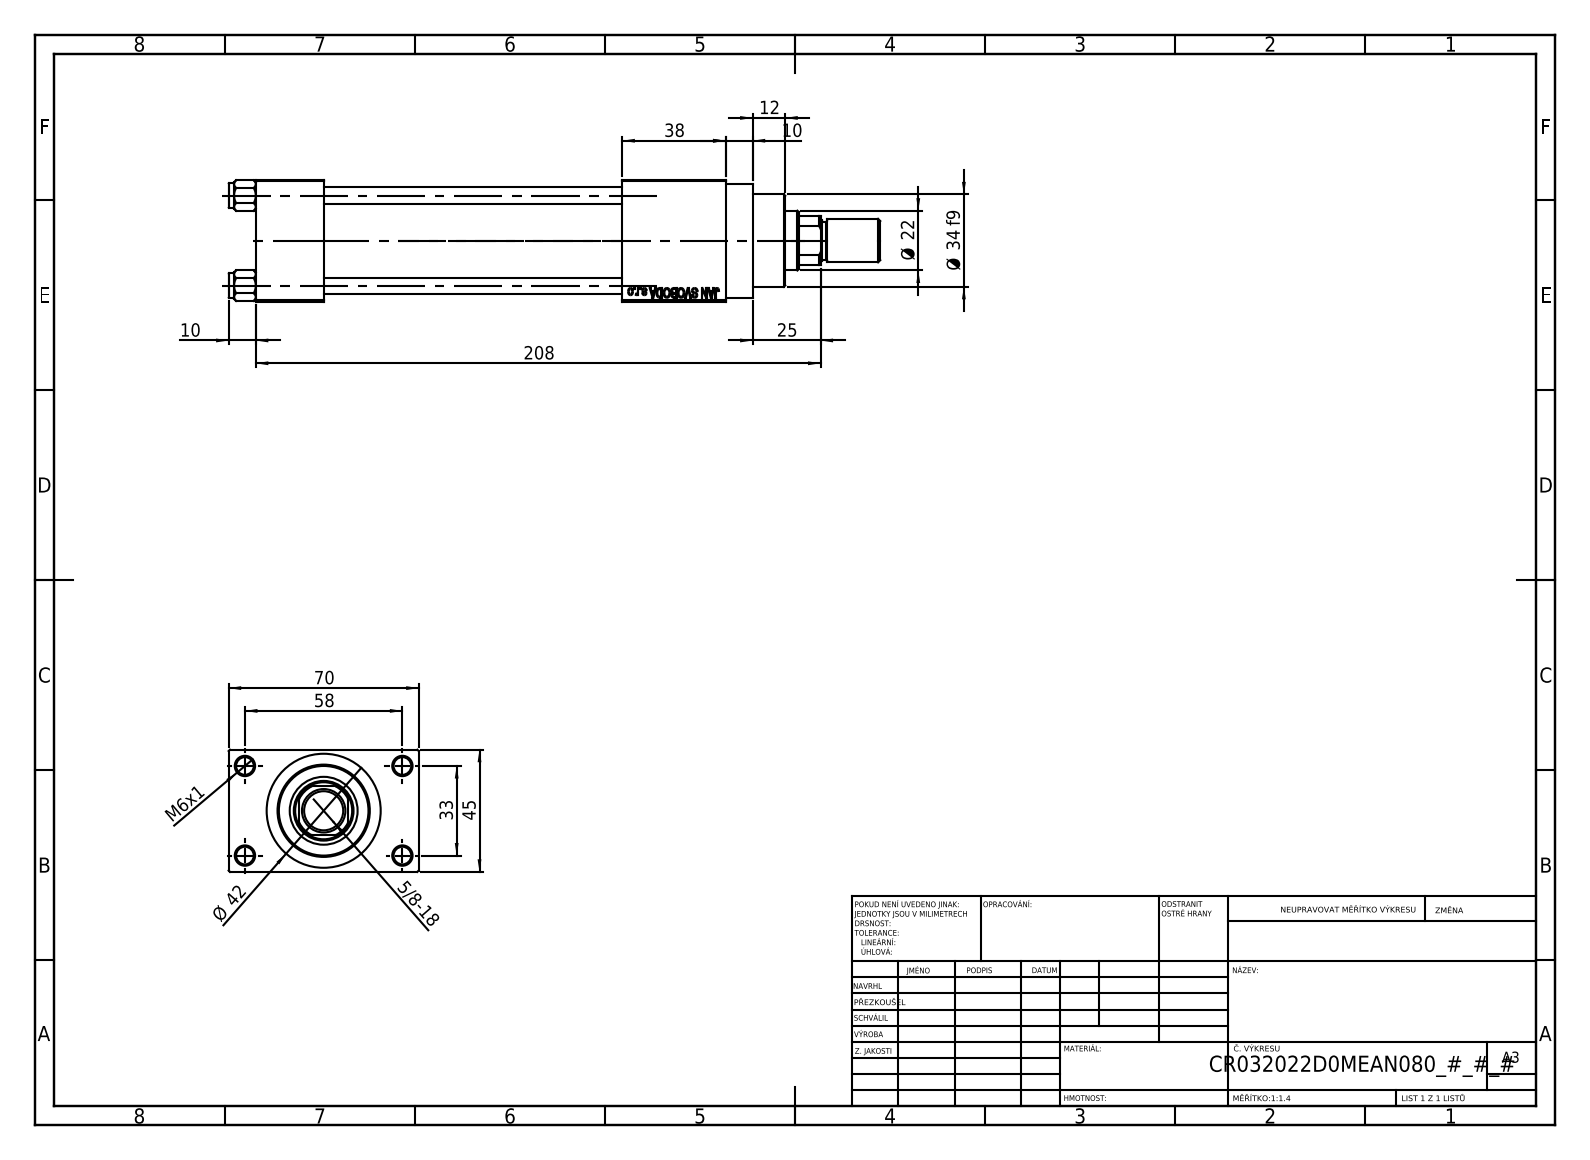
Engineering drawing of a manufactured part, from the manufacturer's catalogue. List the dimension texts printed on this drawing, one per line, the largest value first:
208
70
58
45
Ø 42
38
Ø 34 f9
33
25
Ø 22
12
10
10
M6x1
5/8-18
